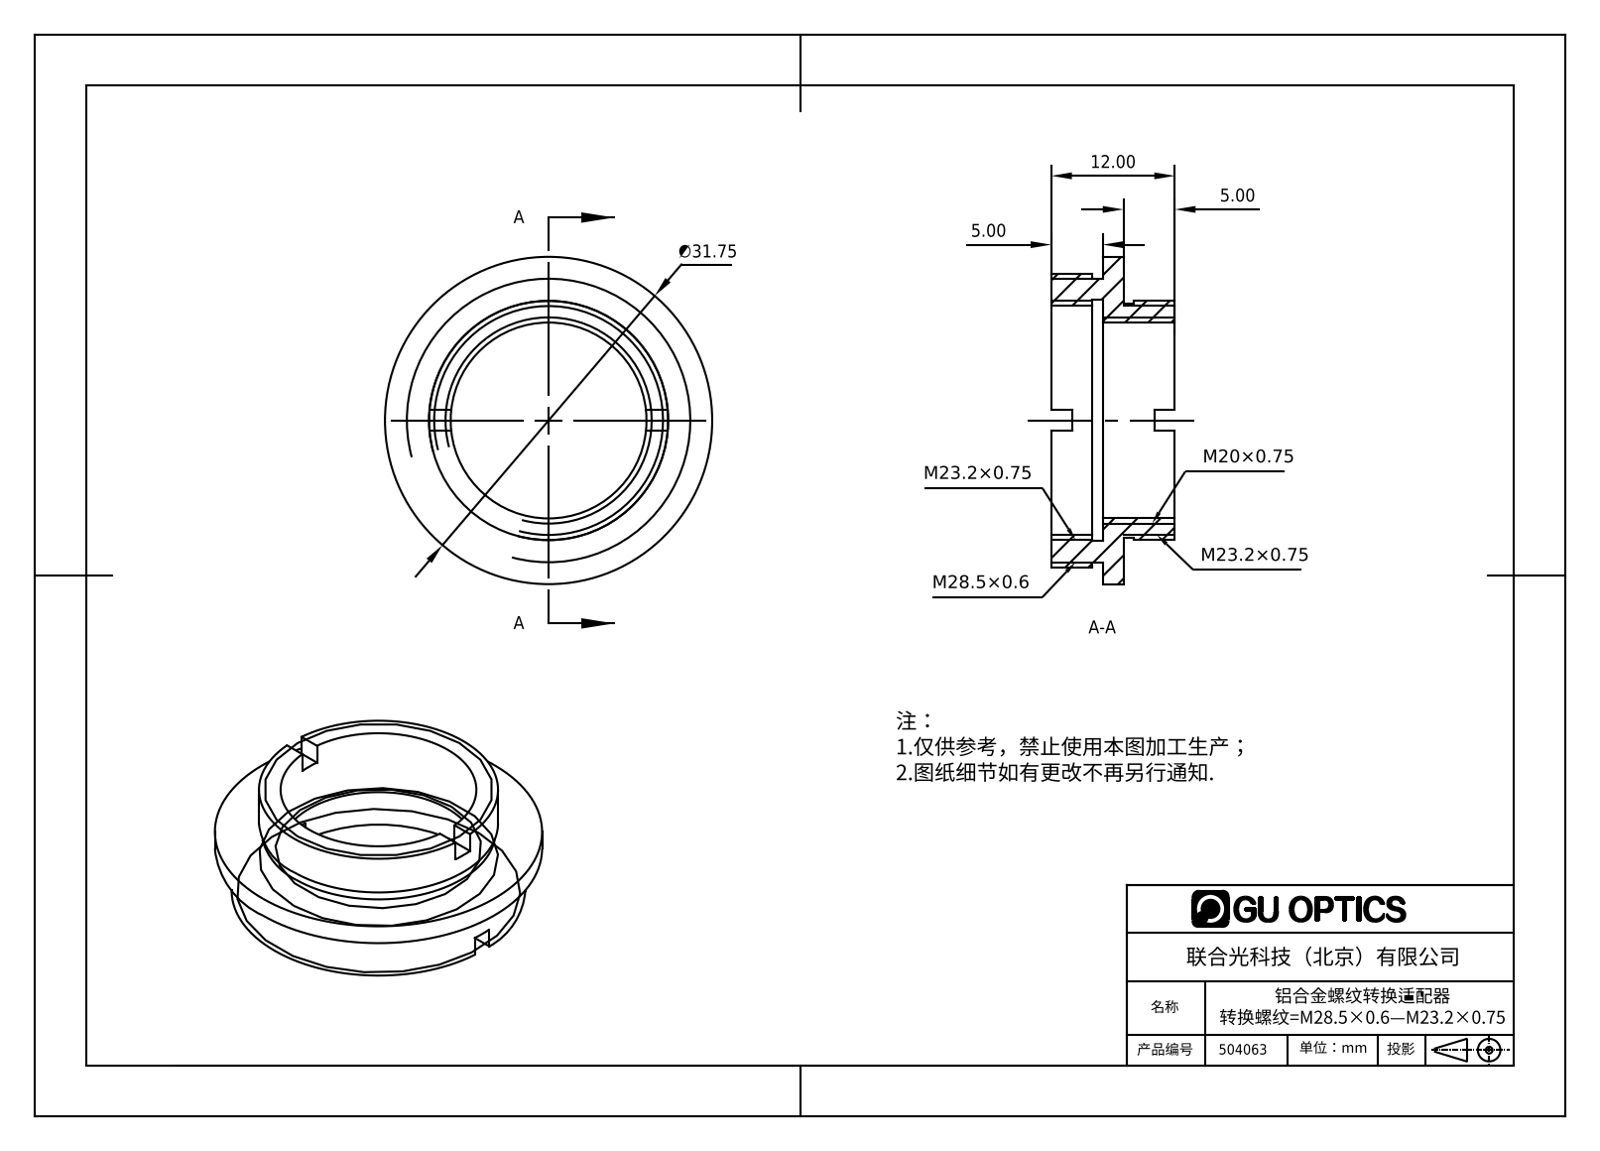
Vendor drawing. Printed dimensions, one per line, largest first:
∅31.75
12.00
5.00
5.00
